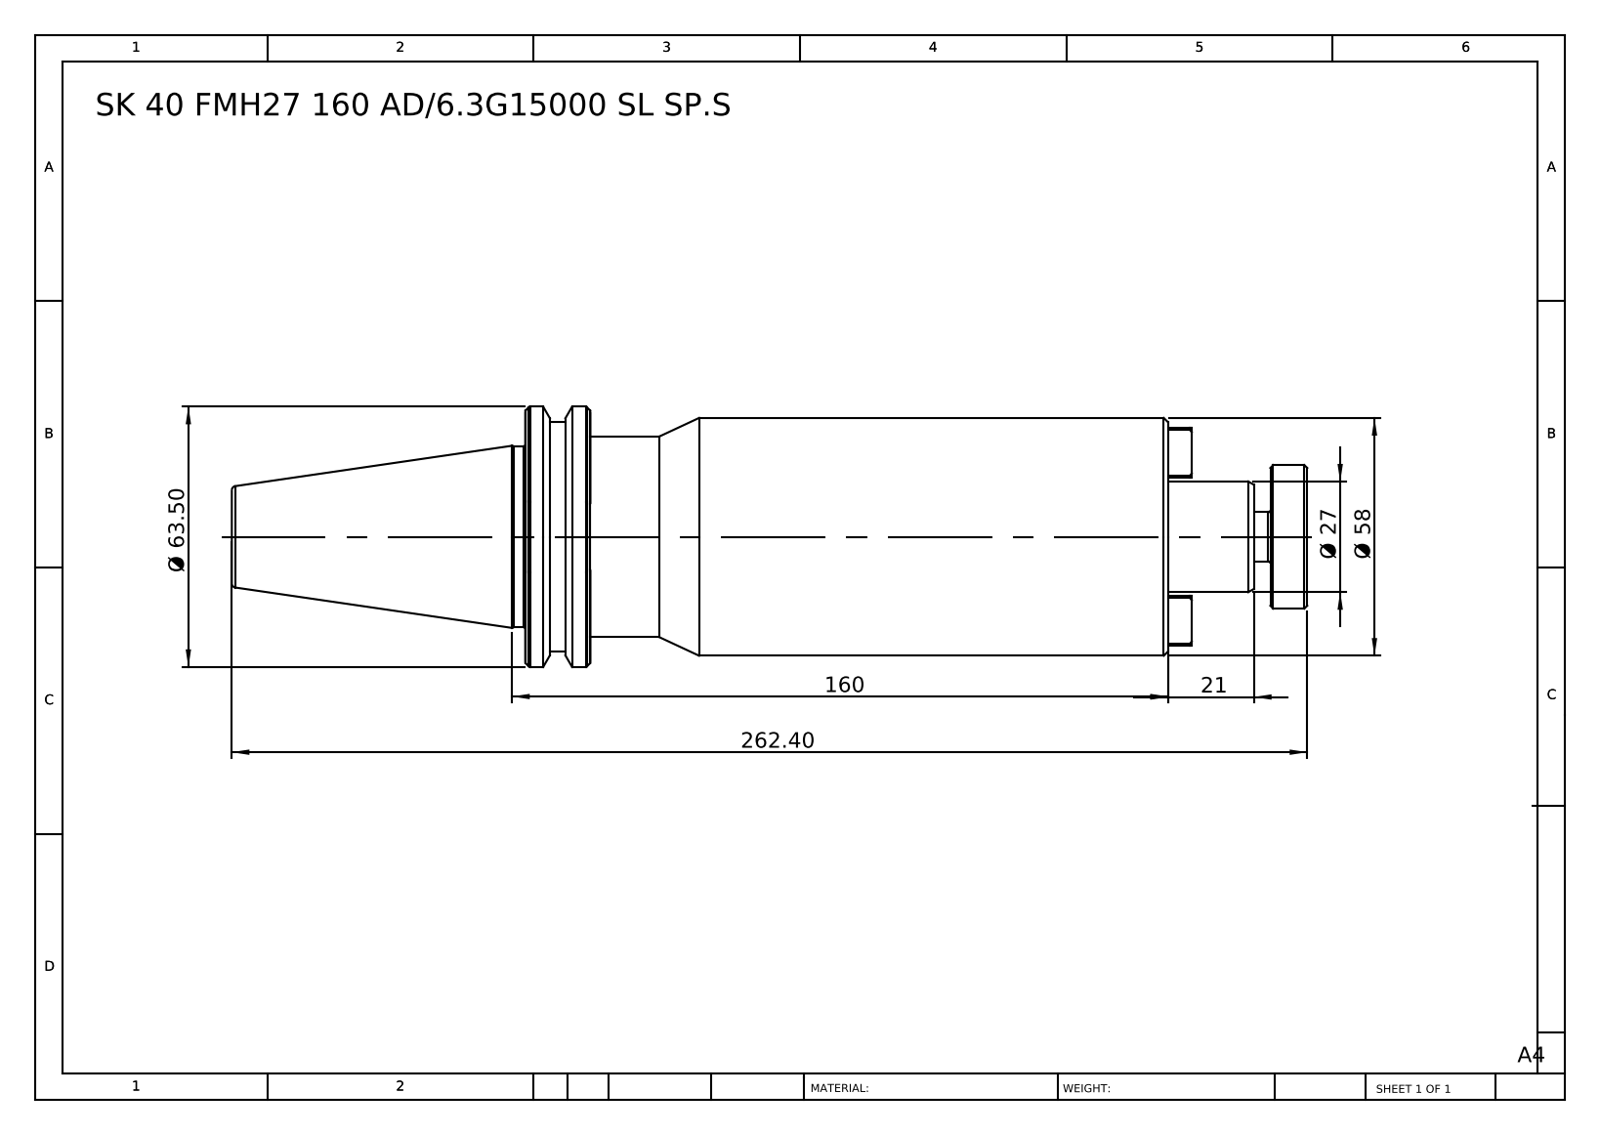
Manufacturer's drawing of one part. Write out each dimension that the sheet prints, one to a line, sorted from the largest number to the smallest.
262.40
160
Ø 63.50
Ø 58
Ø 27
21
